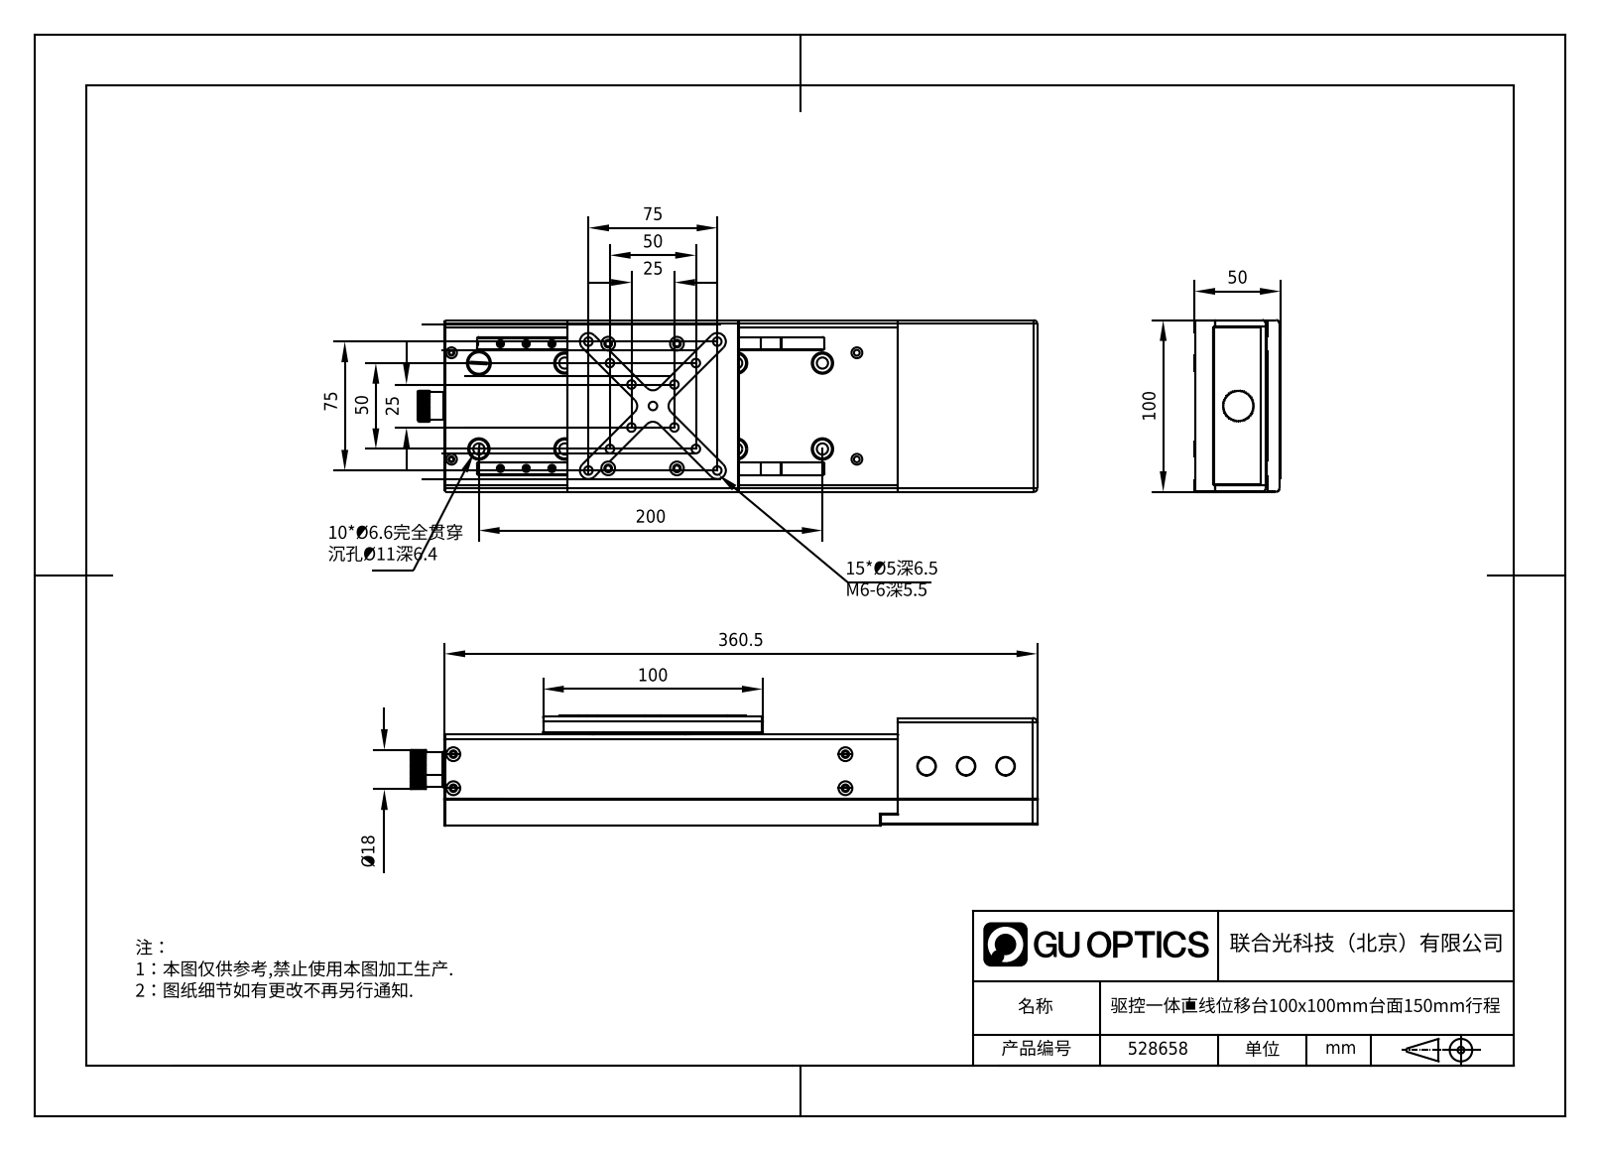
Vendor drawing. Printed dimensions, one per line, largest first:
360.5
200
100
100
75
75
50
50
50
25
25
Ø18
